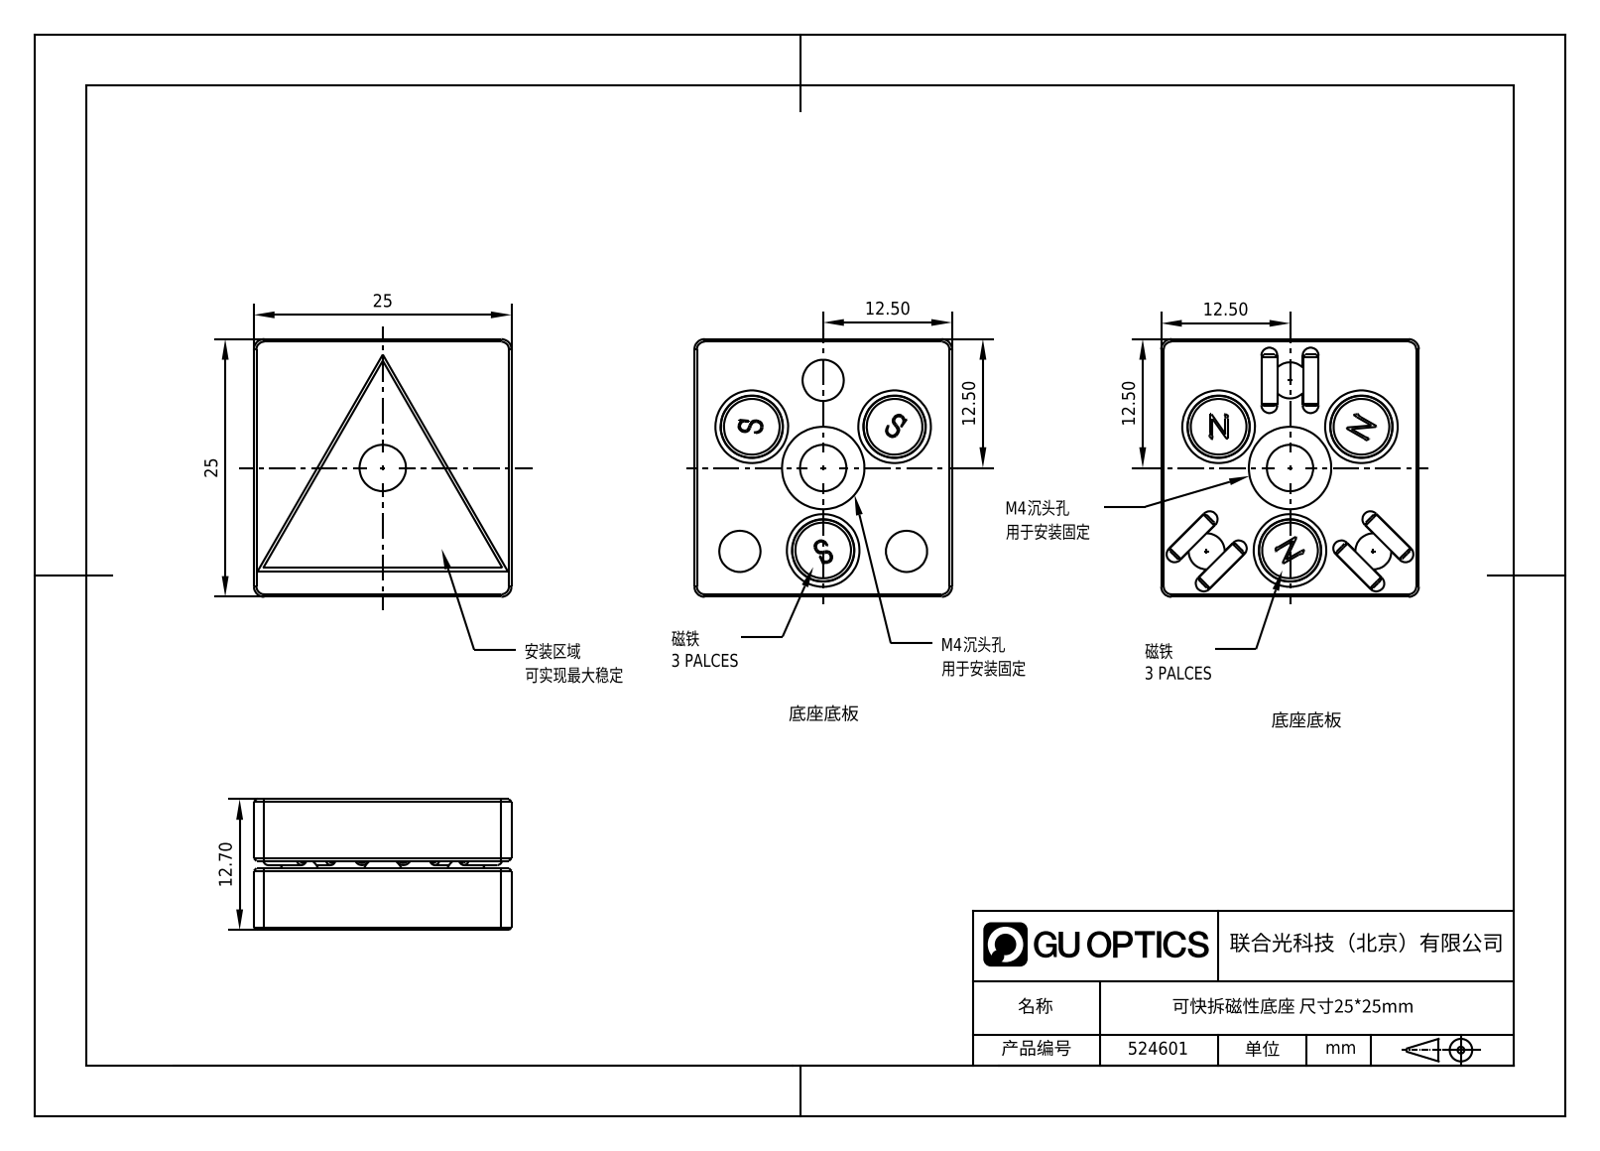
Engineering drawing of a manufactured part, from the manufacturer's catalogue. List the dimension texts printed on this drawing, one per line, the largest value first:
25
25
12.70
12.50
12.50
12.50
12.50
